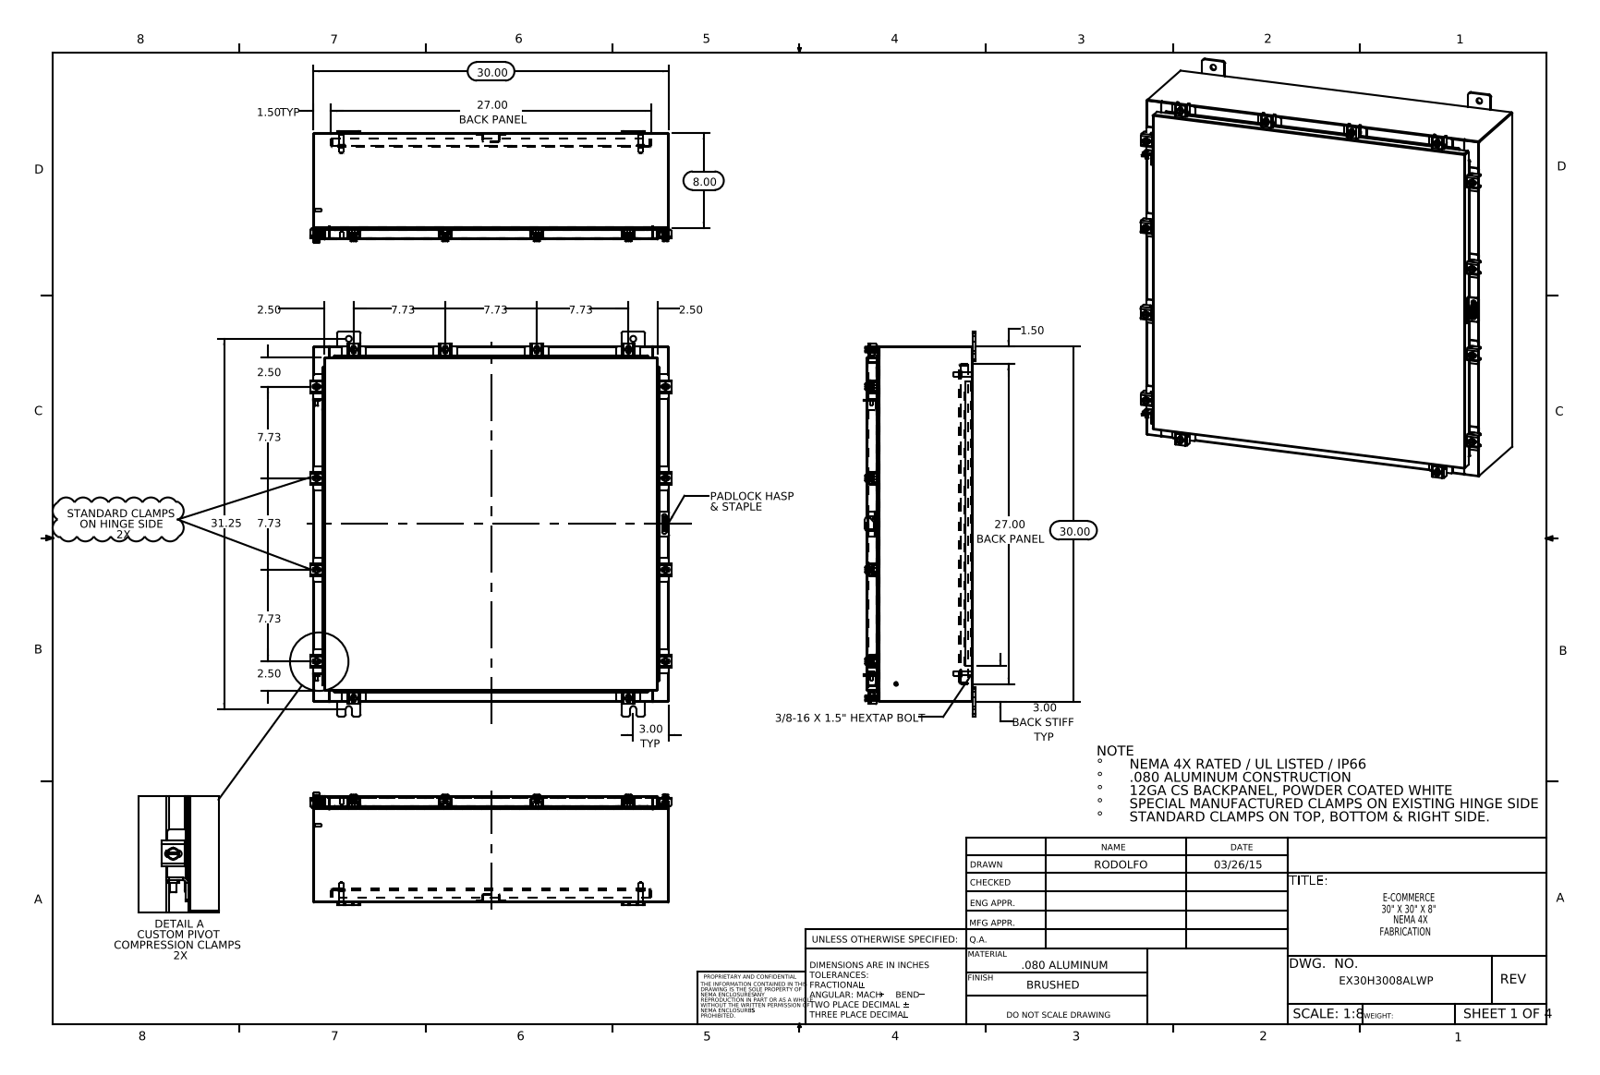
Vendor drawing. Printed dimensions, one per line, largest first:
31.25
30.00
30.00
27.00 BACK PANEL
27.00 BACK PANEL
8.00
7.73
7.73
7.73
7.73
7.73
7.73
3.00 TYP
3.00 BACK STIFF TYP
2.50
2.50
2.50
2.50
1.50 TYP
1.50
